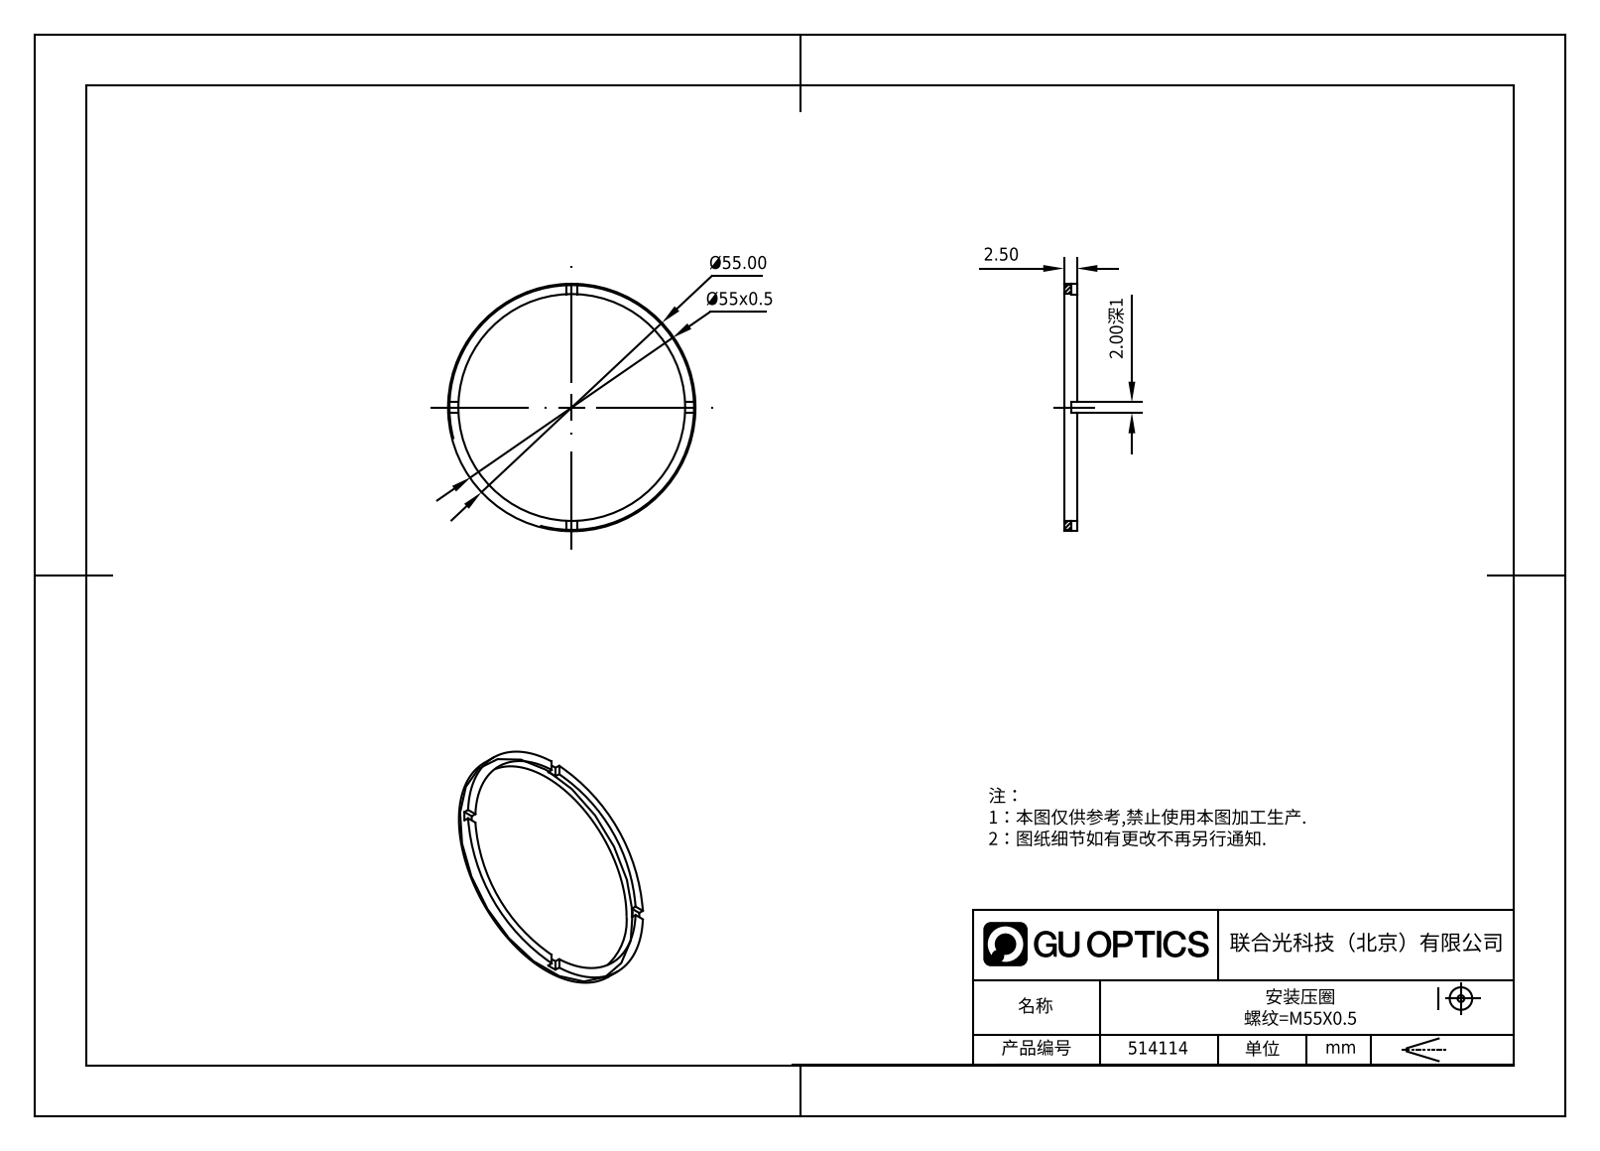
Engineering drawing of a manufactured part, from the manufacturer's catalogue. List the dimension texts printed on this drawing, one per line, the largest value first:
Ø55.00
Ø55x0.5
2.50
2.00深1
